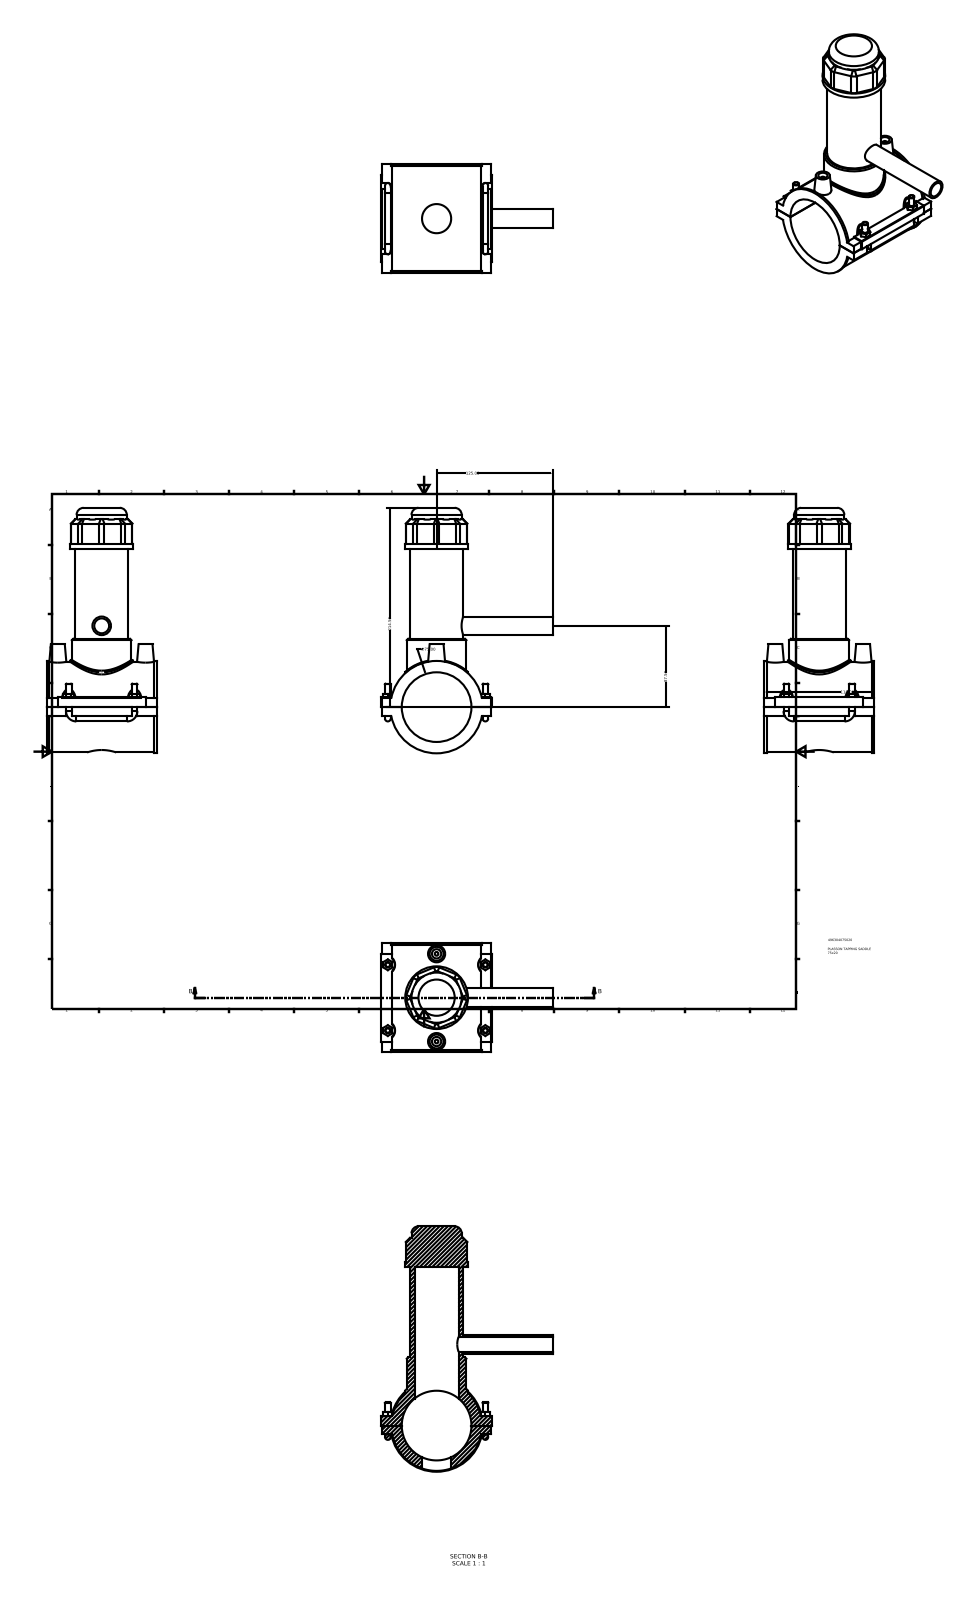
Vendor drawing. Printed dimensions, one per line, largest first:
214.50
125.00
118.00
87.50
∅75.00
